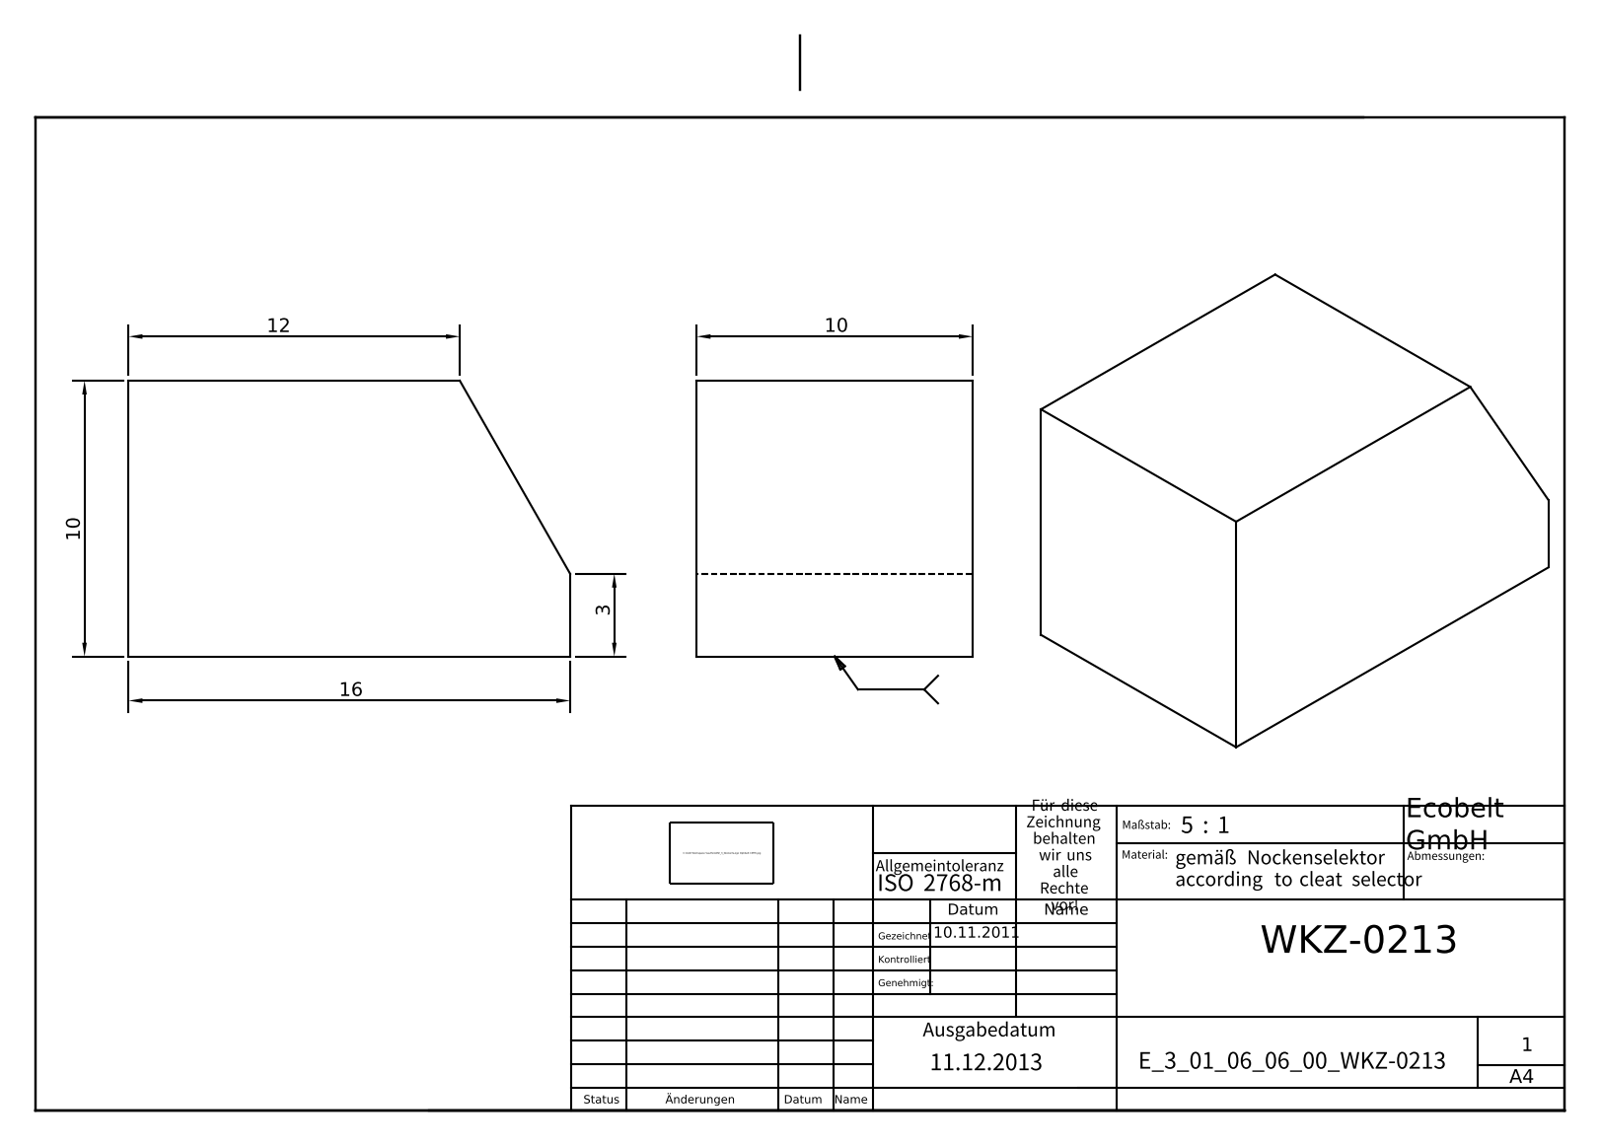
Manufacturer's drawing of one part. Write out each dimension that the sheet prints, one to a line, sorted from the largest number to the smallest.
16
12
10
10
3
